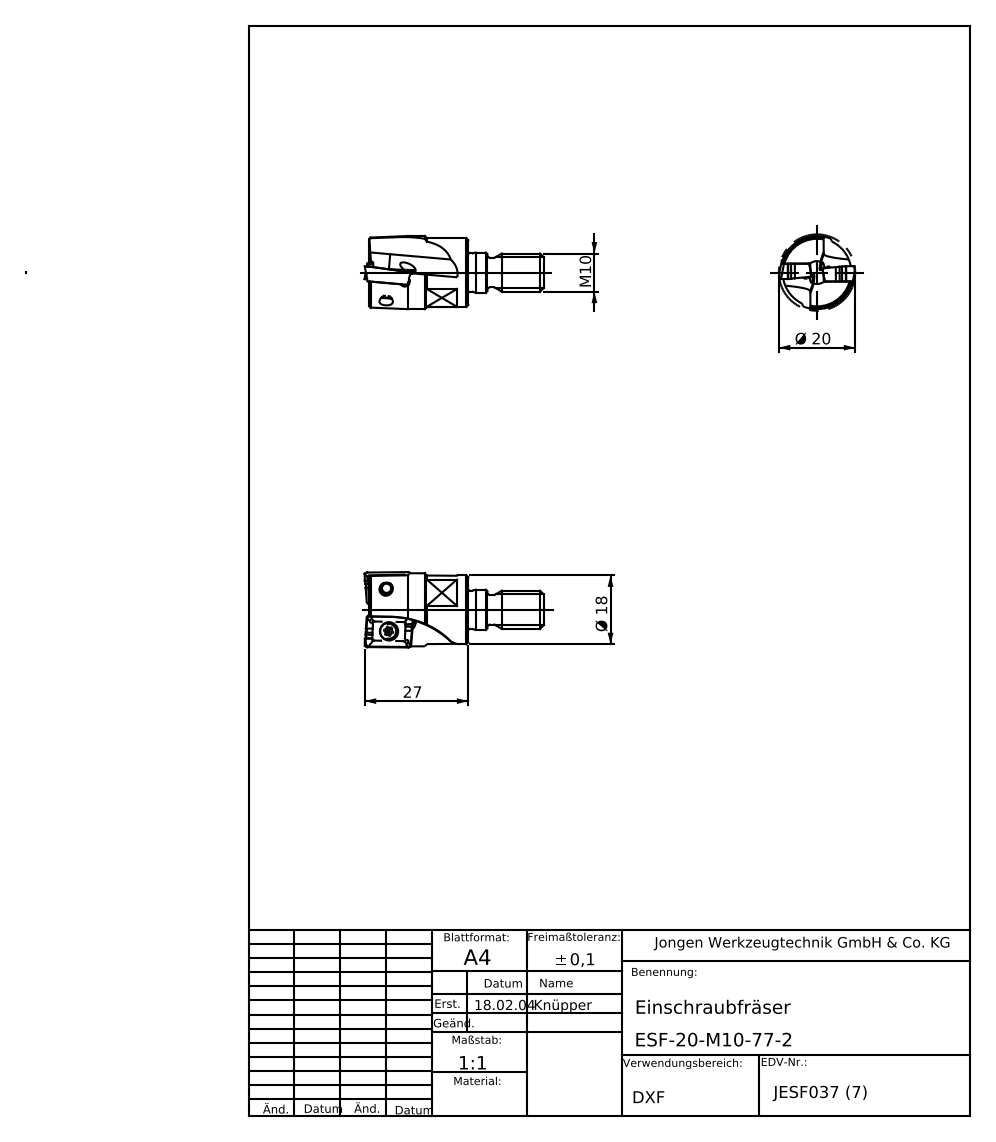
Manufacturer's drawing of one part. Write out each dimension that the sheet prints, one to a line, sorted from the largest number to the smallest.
27
Ø 20
Ø 18
M 10
